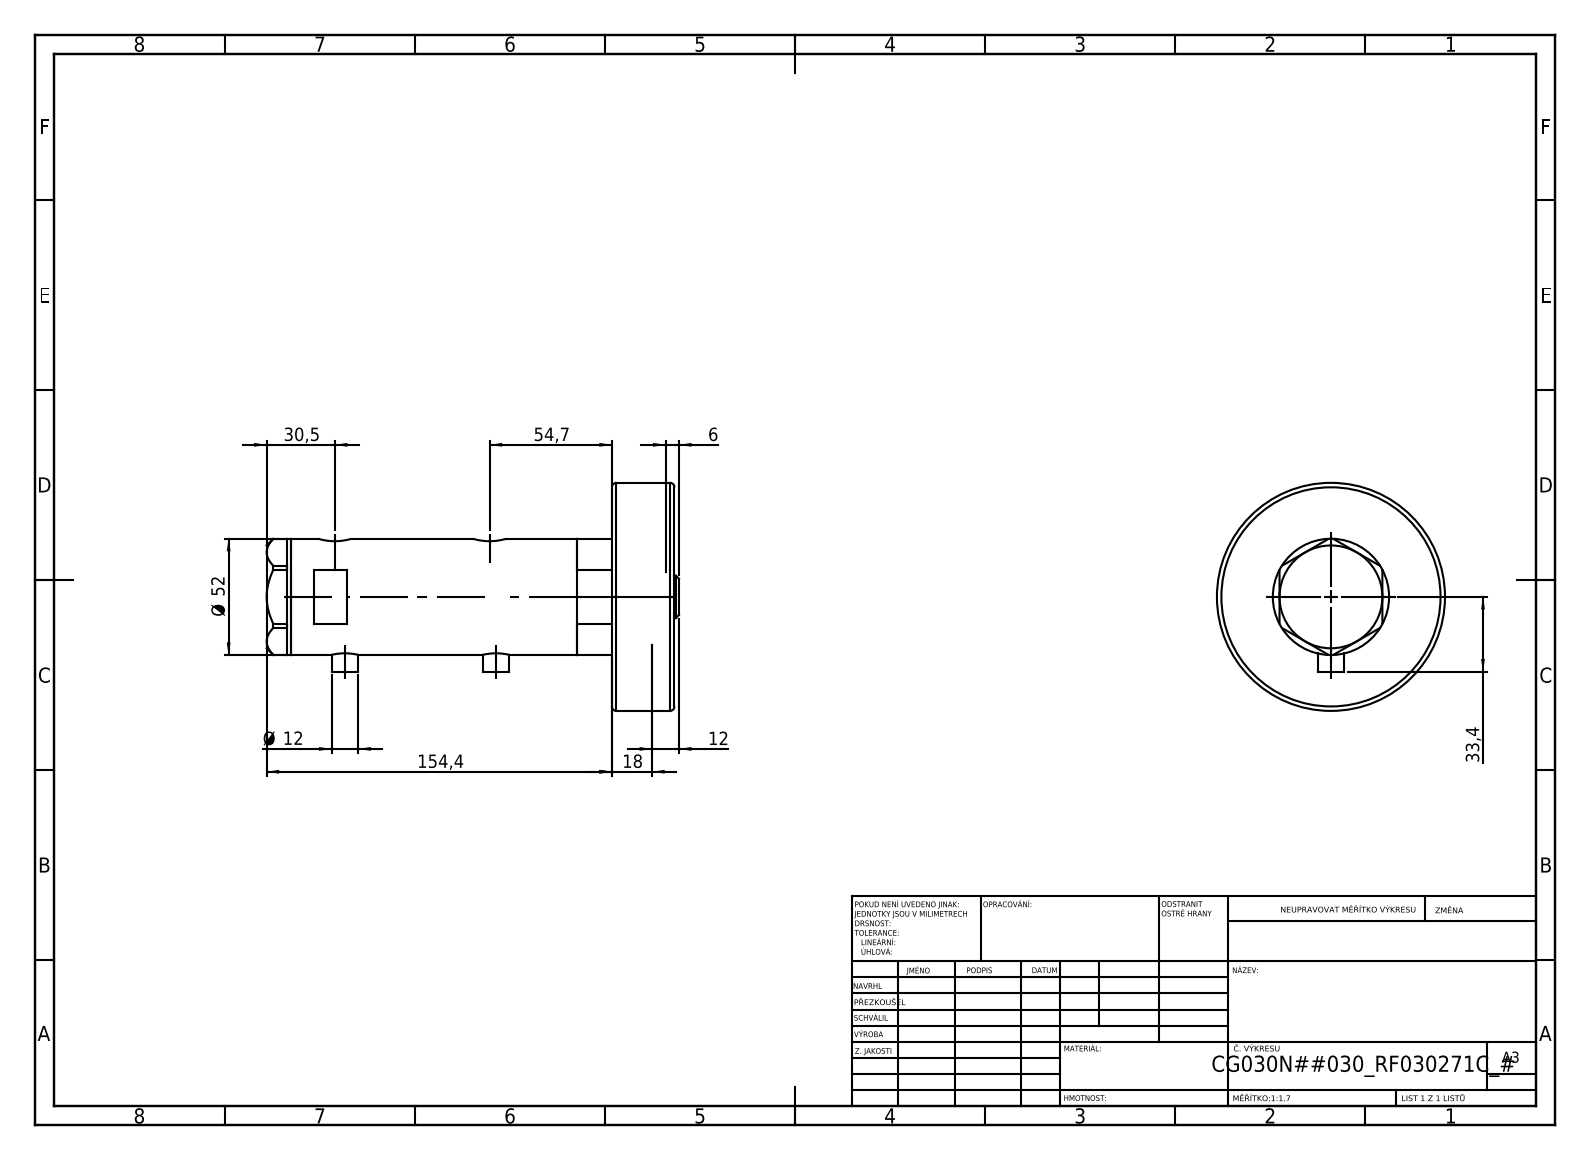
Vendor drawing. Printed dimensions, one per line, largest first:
154,4
54,7
Ø 52
33,4
30,5
18
12
Ø 12
6
